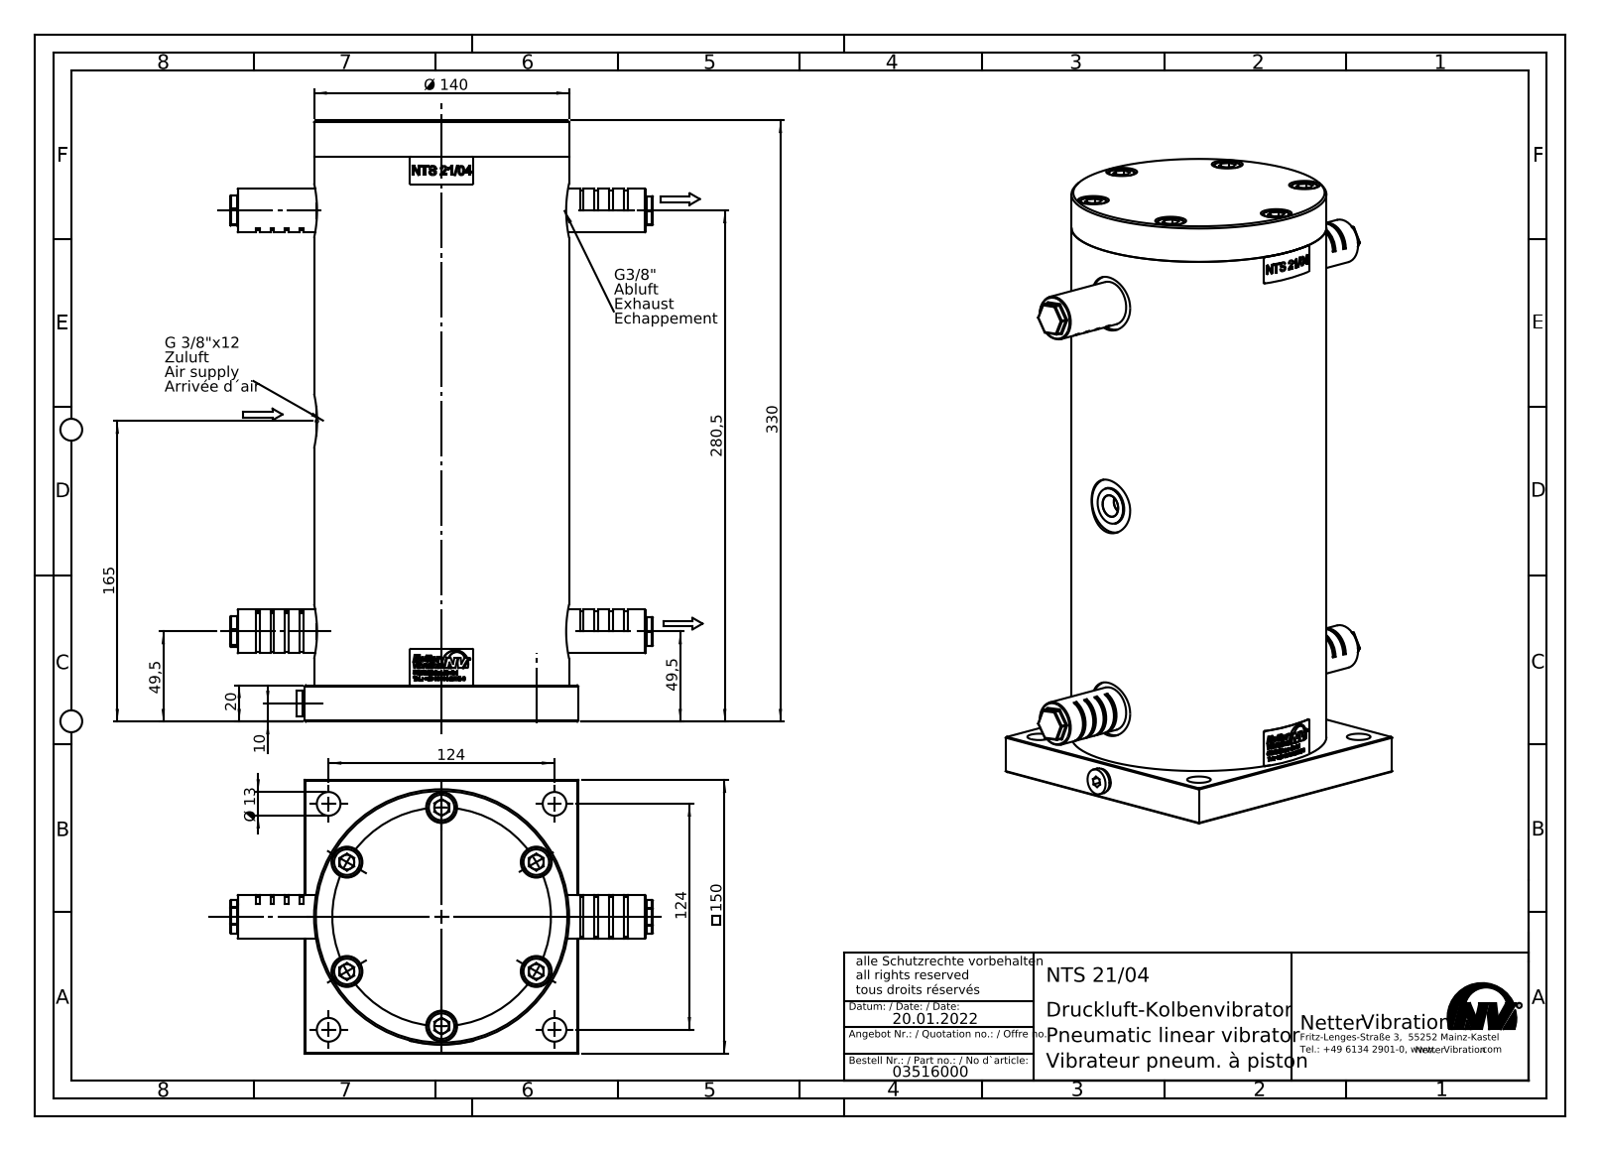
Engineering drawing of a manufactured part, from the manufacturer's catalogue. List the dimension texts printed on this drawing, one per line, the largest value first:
330
280,5
165
150
Ø 140
124
124
49,5
49,5
20
Ø 13
10
